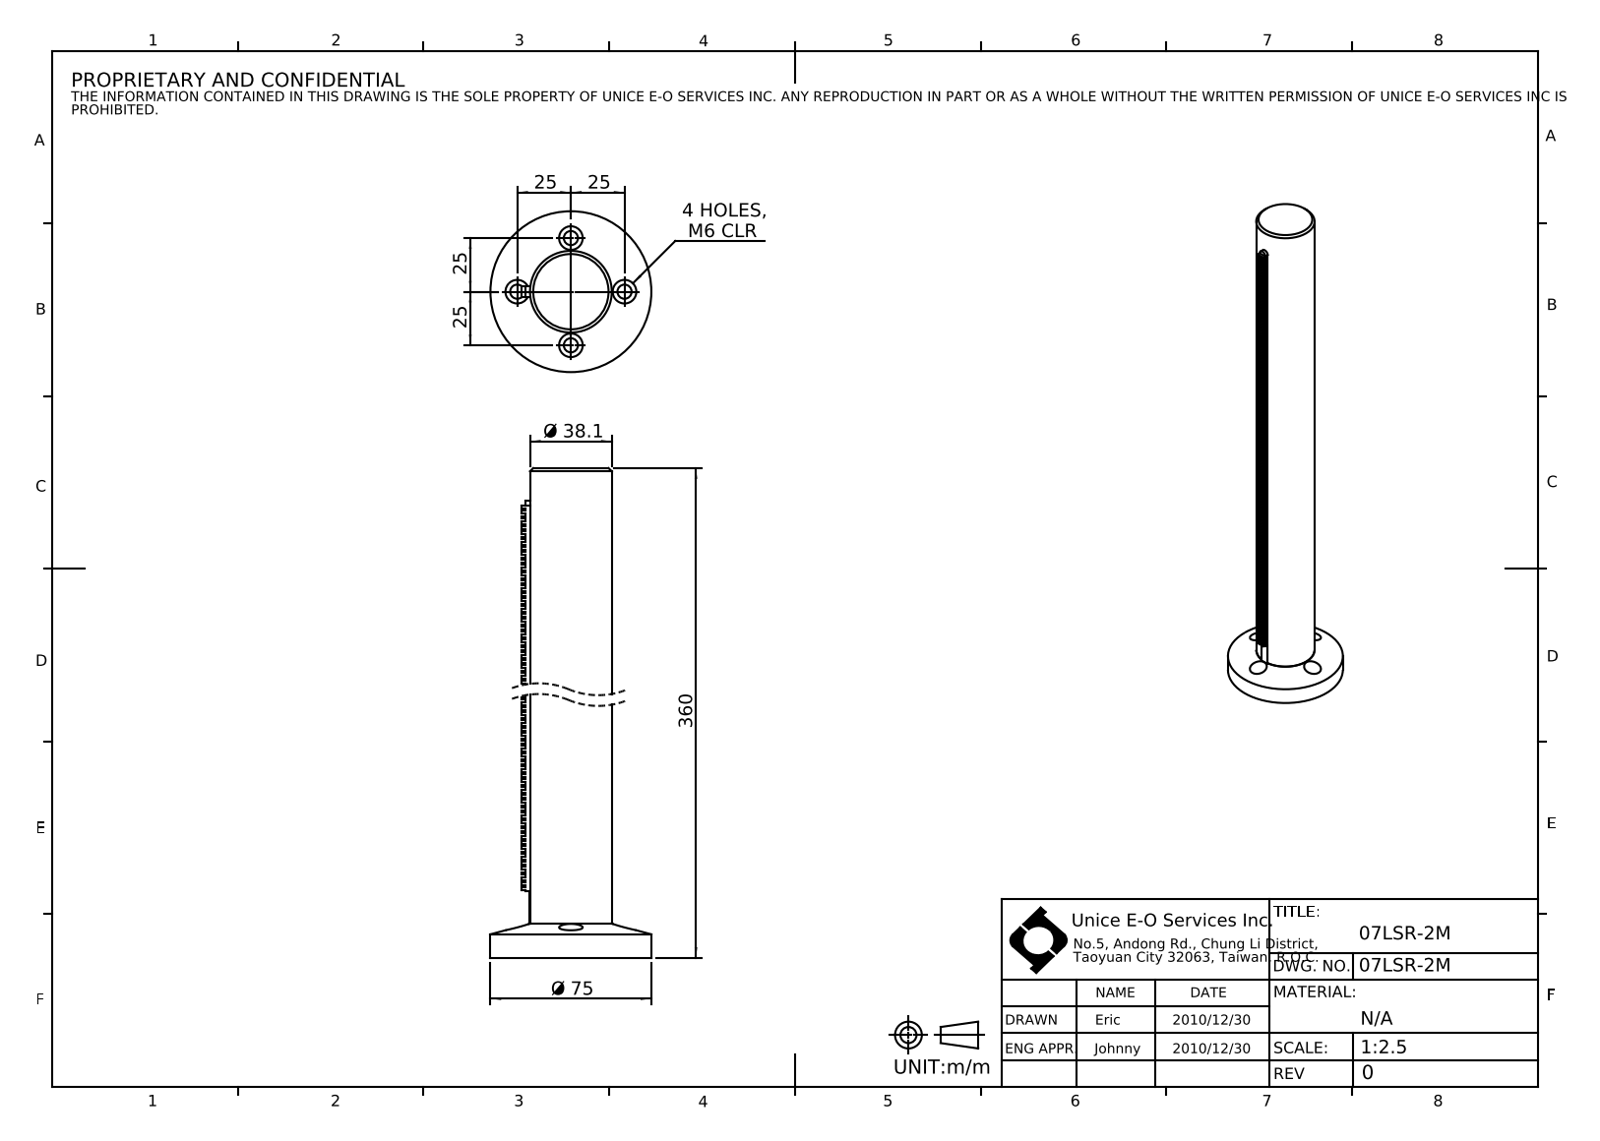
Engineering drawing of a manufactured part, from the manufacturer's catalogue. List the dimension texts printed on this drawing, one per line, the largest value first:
360
Ø 75
Ø 38.1
25
25
25
25
4 HOLES, M6 CLR
